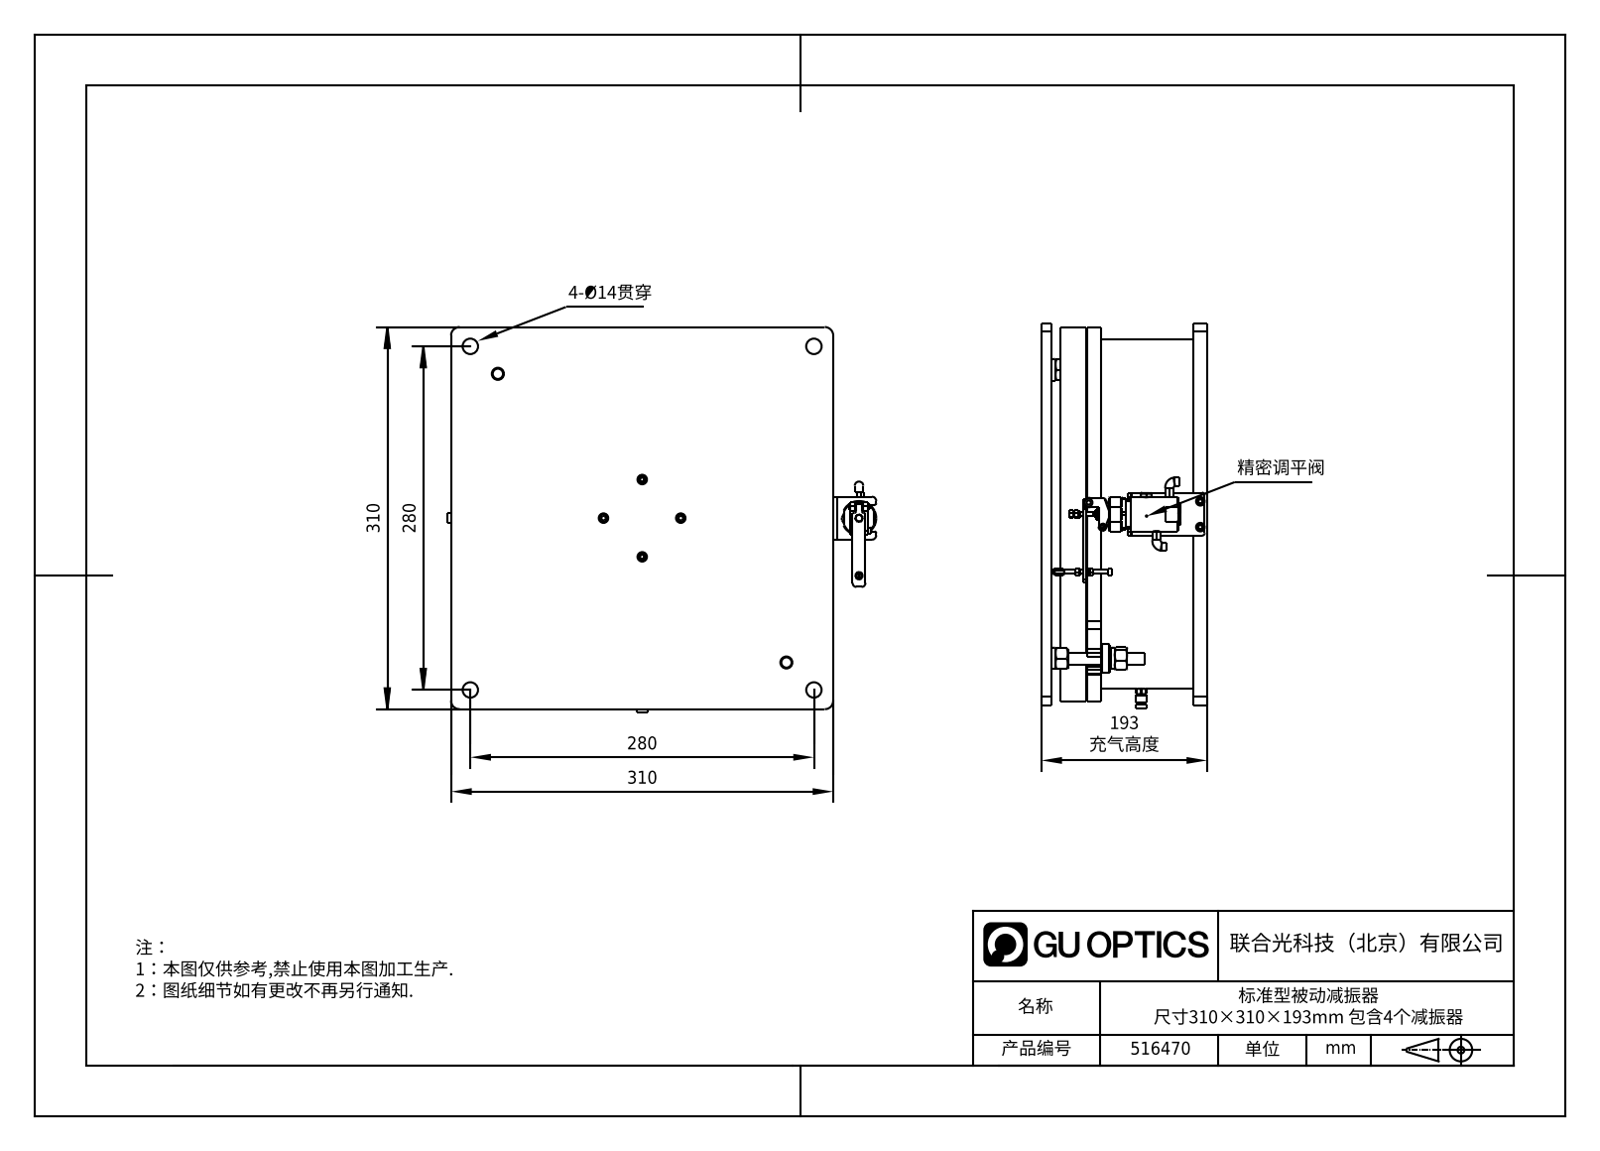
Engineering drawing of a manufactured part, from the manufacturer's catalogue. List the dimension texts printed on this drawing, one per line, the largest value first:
310
310
280
280
193 充气高度
